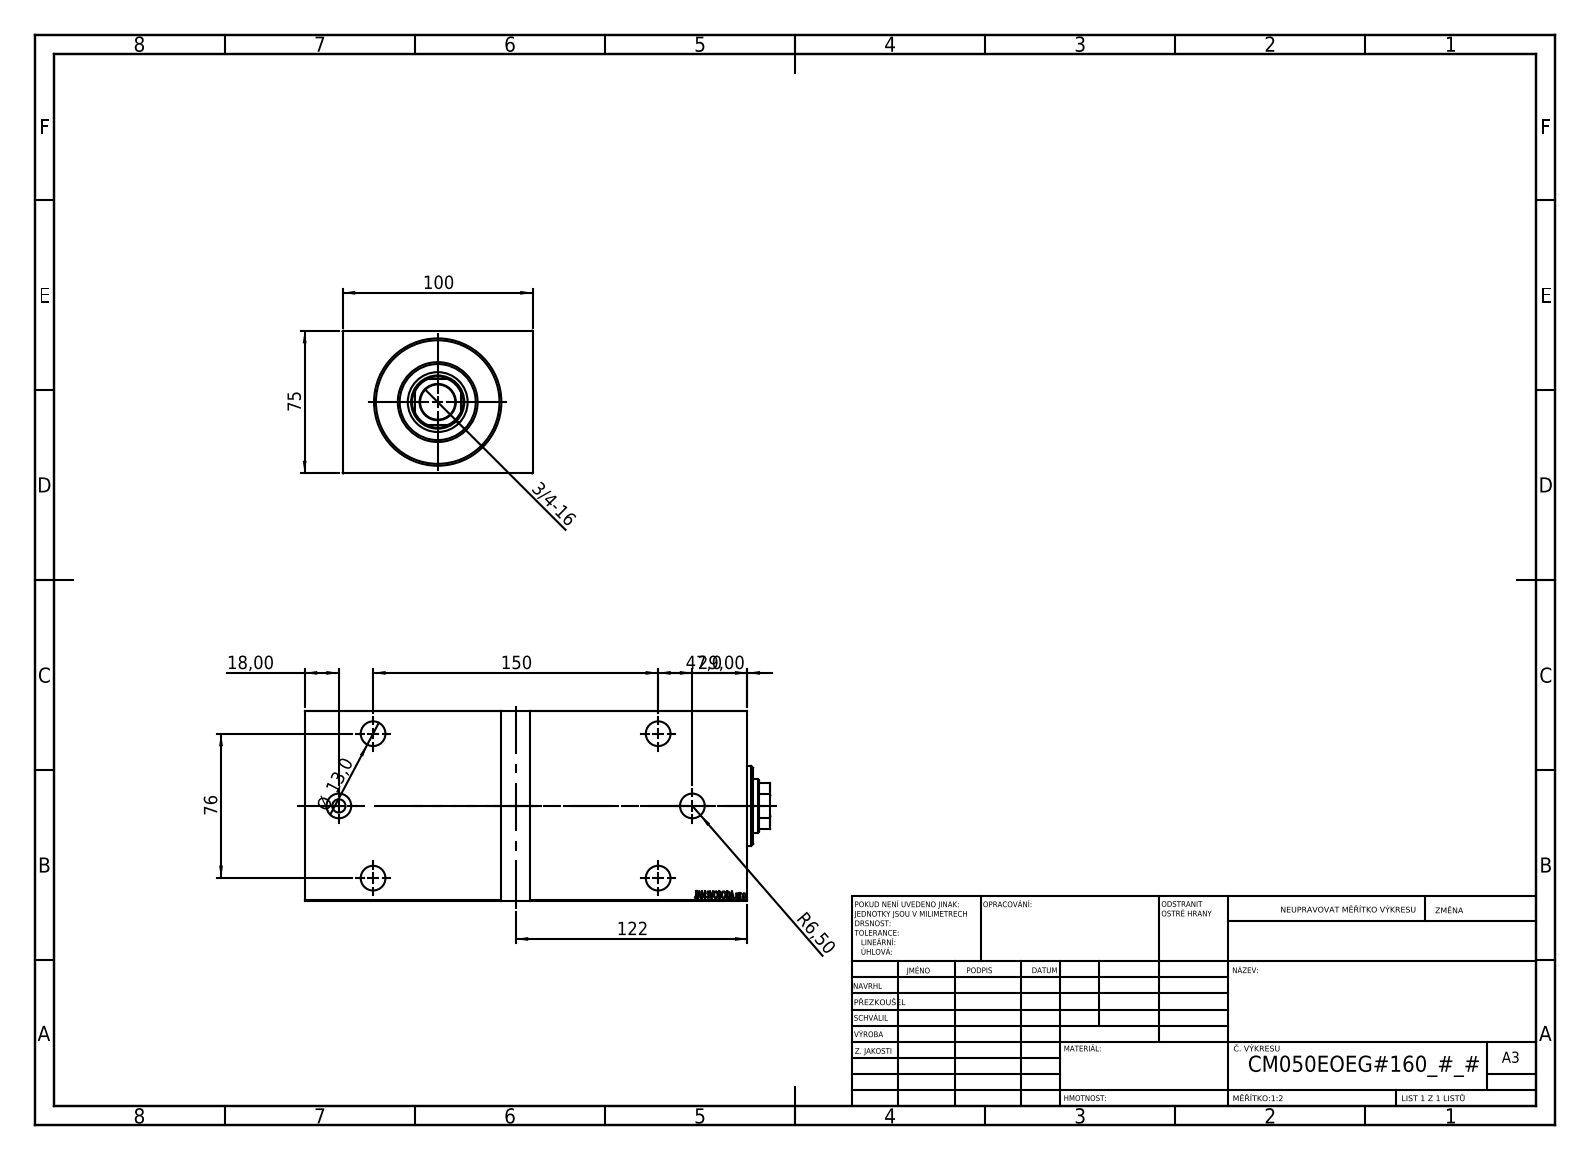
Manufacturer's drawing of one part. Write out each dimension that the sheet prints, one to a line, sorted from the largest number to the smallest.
150
122
100
76
75
47,0
29,00
18,00
Ø 13,0
R6,50
3/4-16
